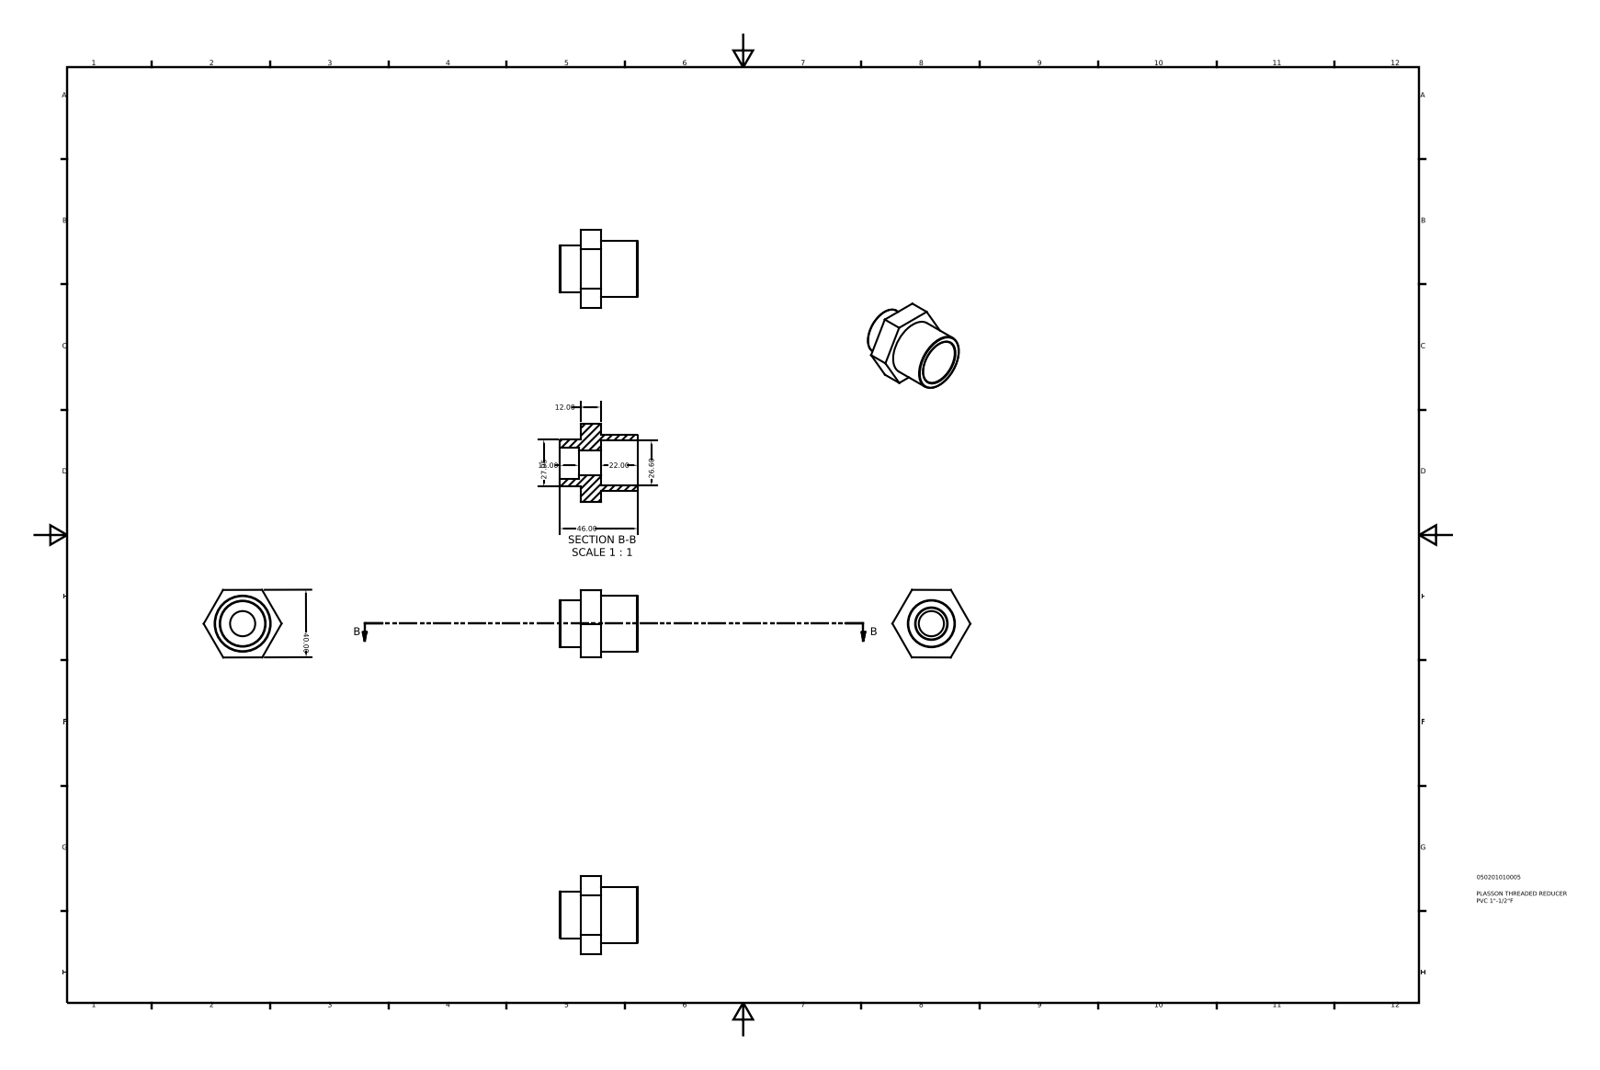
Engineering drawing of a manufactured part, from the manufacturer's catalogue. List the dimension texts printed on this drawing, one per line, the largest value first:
46.00
40.00
27.95
26.60
22.00
12.00
11.00
